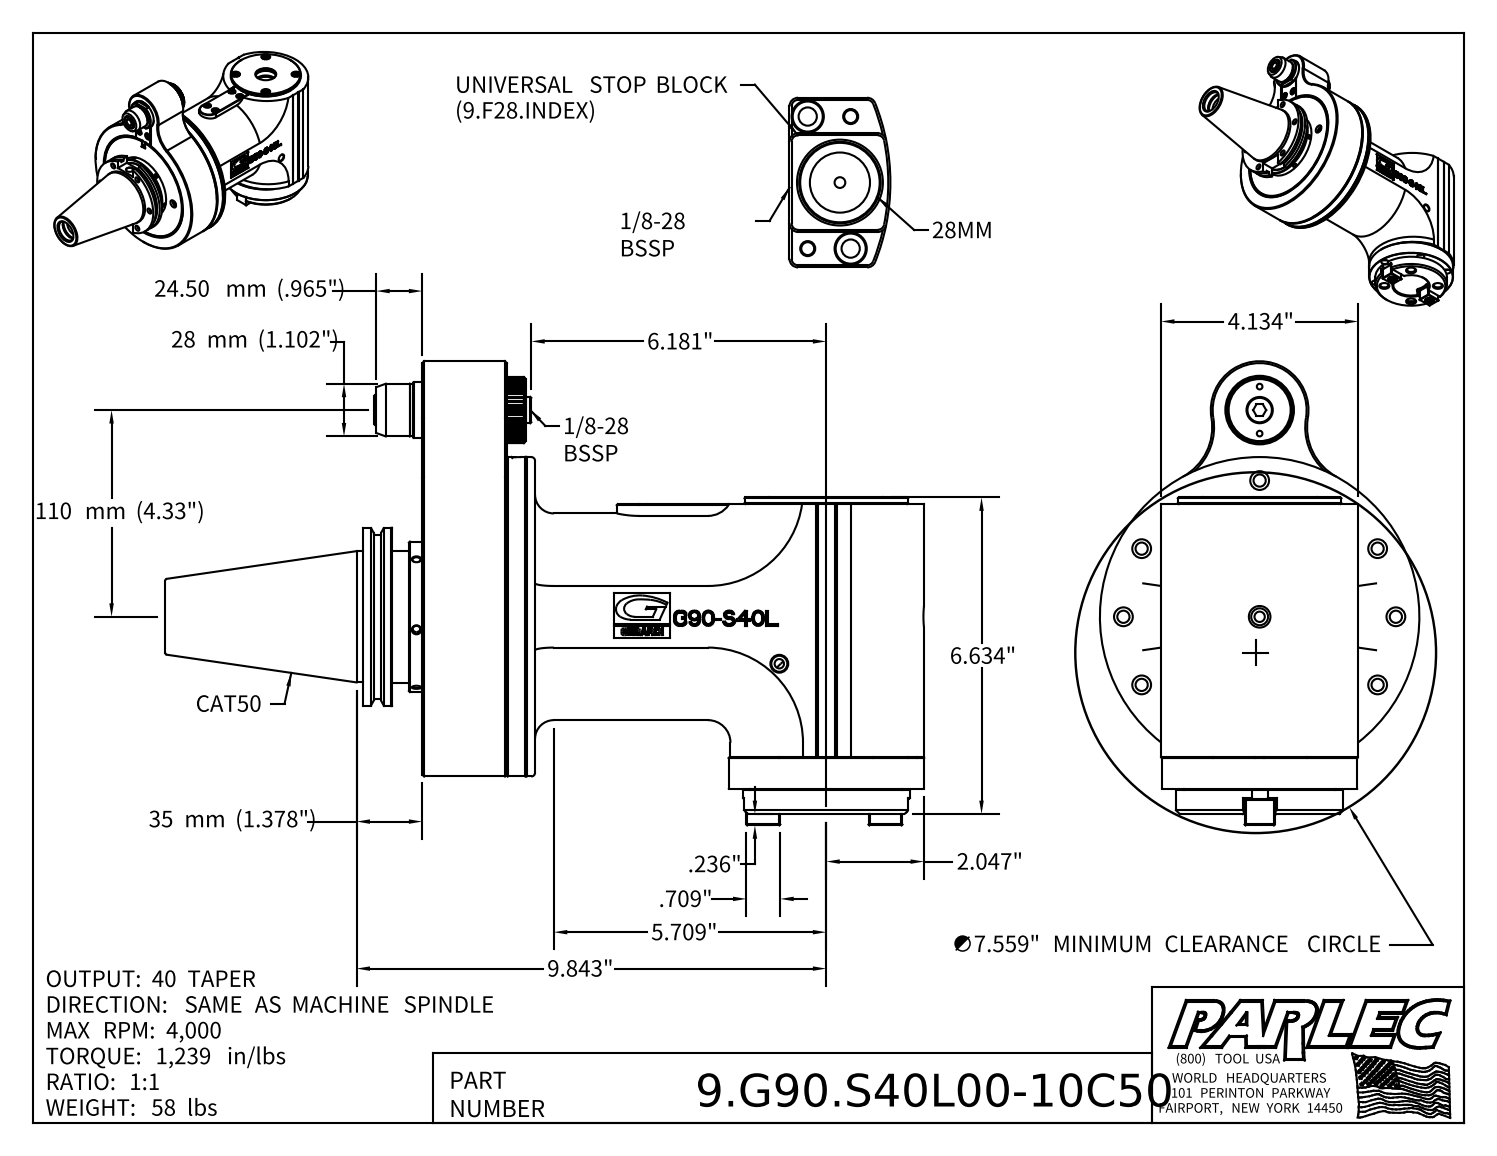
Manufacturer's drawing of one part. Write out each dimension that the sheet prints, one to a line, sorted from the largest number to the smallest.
110 mm (4.33")
35 mm (1.378")
28 mm (1.102")
24.50 mm (.965")
9.843"
∅7.559" MINIMUM CLEARANCE CIRCLE
6.634"
6.181"
5.709"
4.134"
2.047"
.709"
.236"
